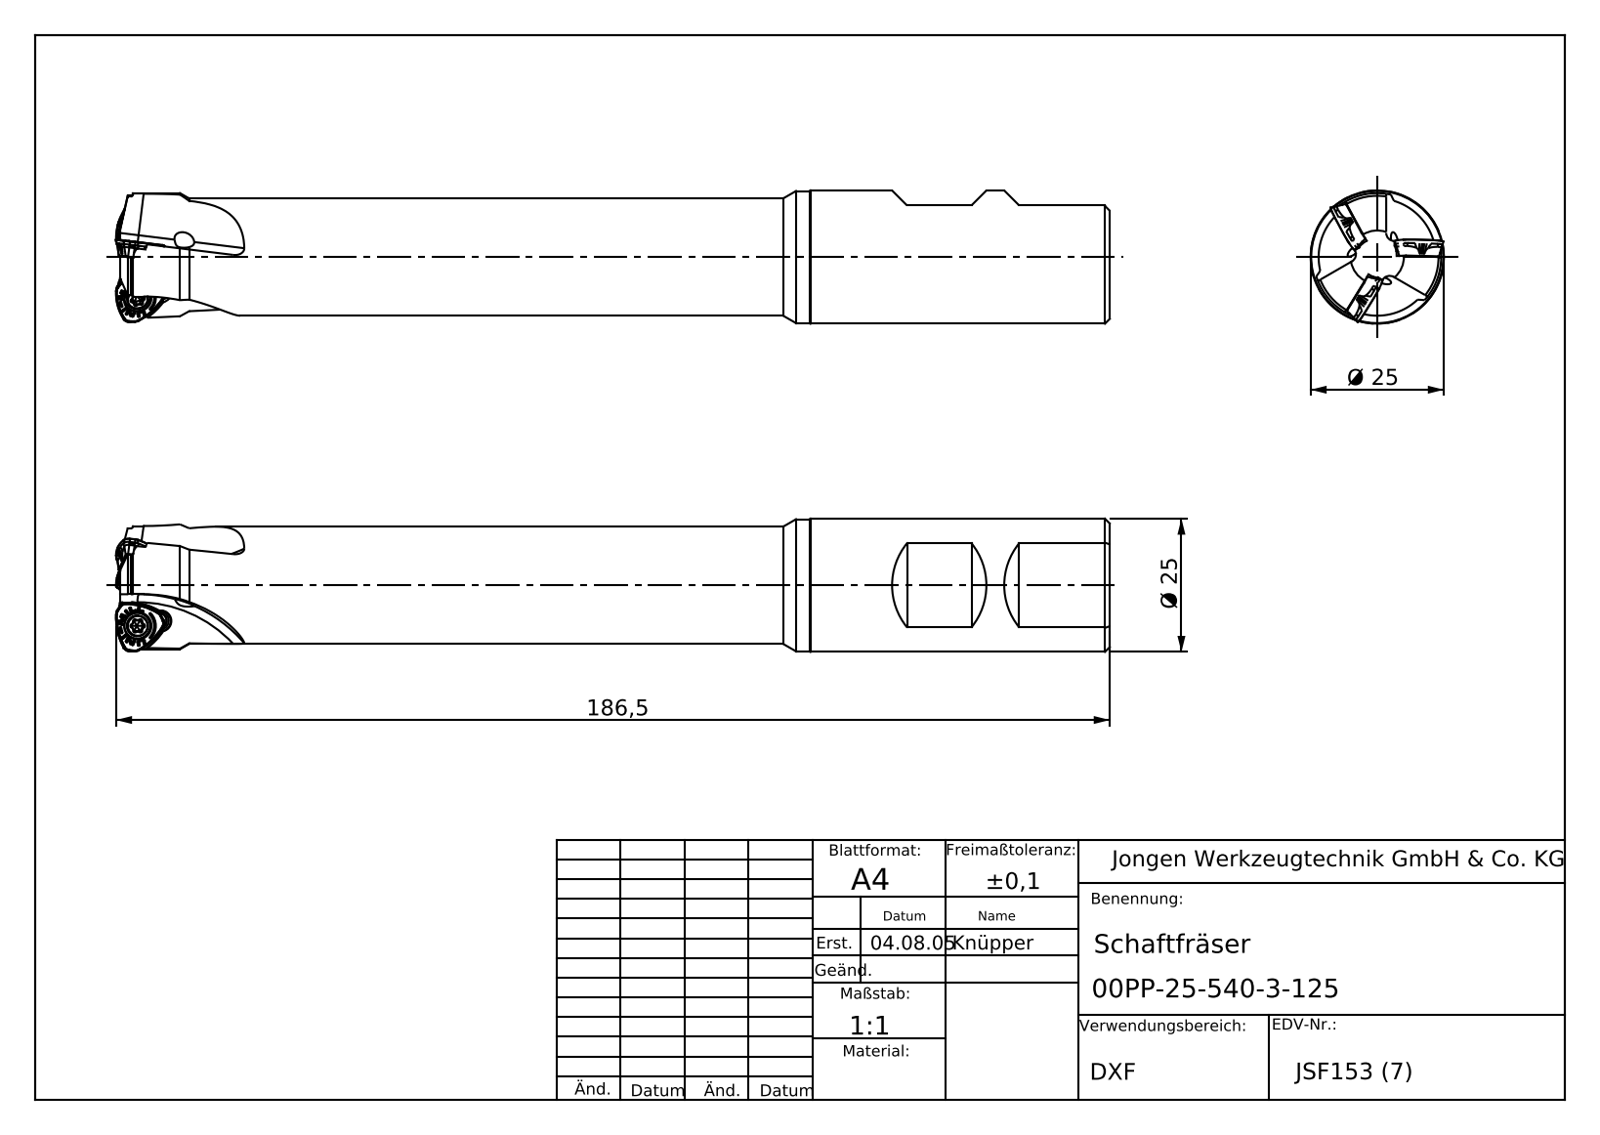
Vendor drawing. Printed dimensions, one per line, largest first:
186,5
Ø 25
Ø 25
